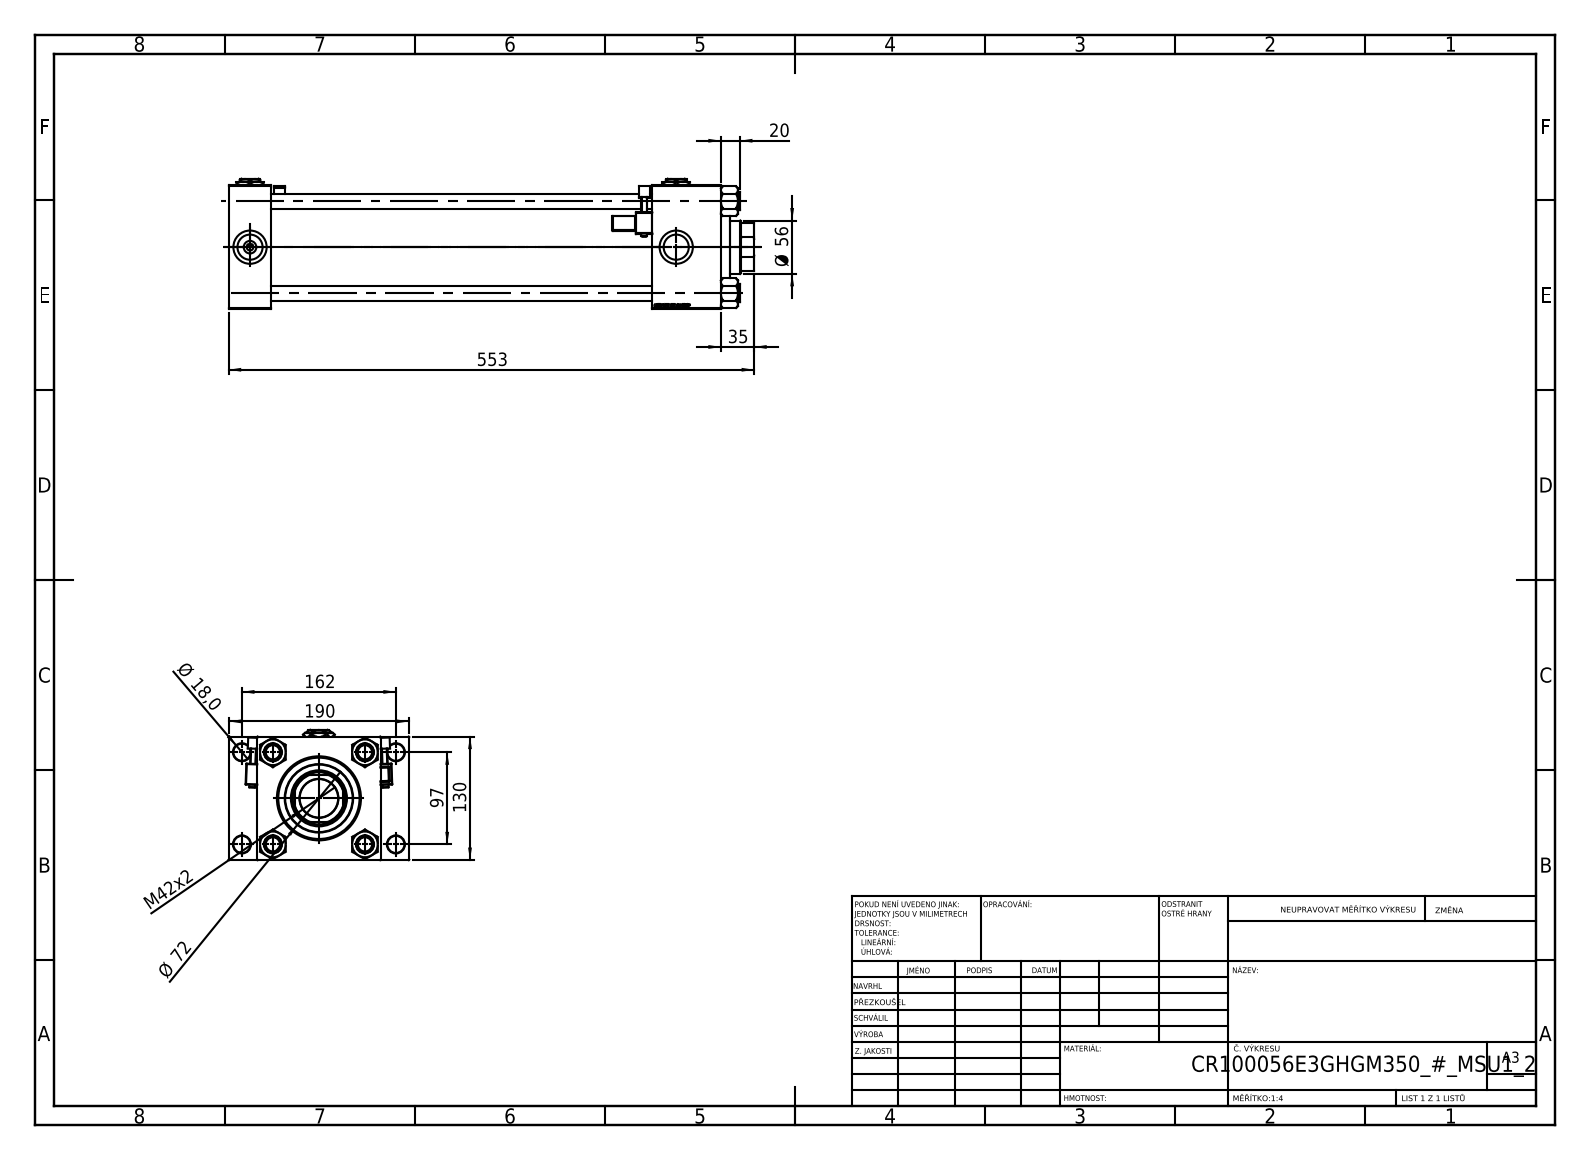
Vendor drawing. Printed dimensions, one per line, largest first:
553
190
162
130
97
Ø 72
Ø 56
M42x2
35
20
Ø 18,0
